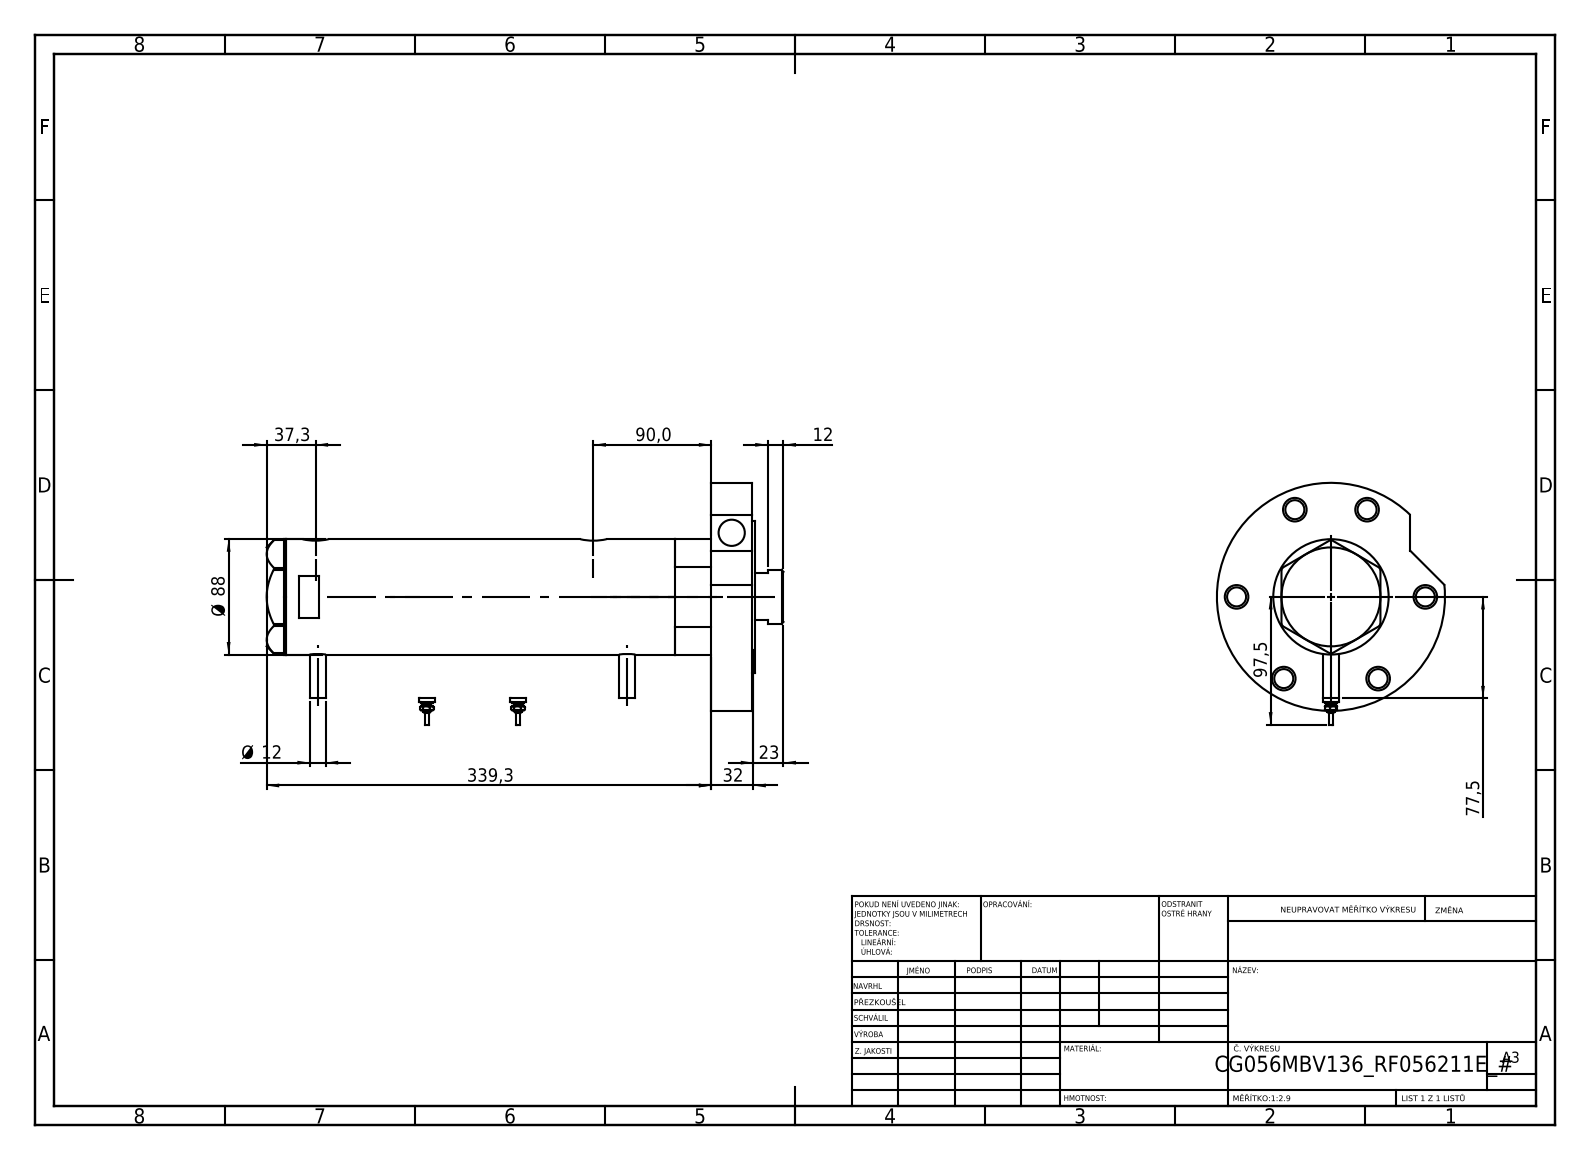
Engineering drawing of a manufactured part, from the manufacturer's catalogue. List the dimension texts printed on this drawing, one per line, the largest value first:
339,3
97,5
90,0
Ø 88
77,5
37,3
32
23
12
Ø 12
